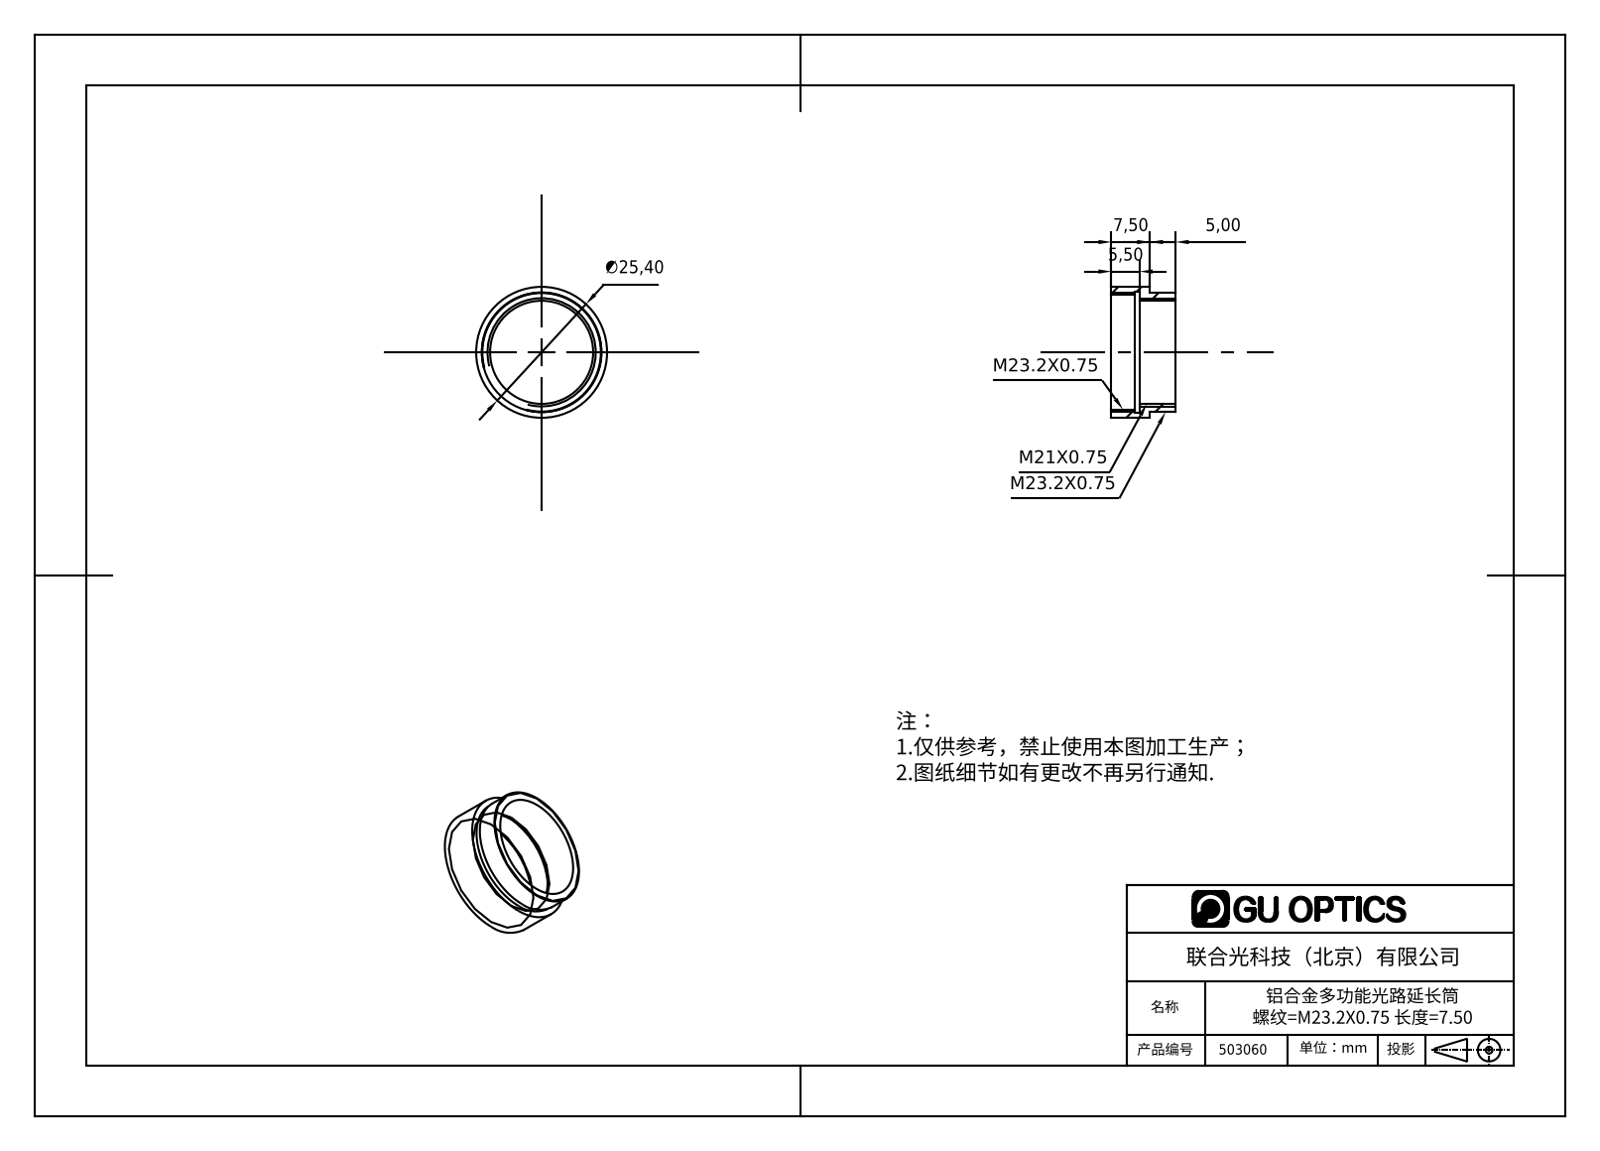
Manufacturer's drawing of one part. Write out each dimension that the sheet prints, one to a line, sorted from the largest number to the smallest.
∅25,40
7,50
5,50
5,00
